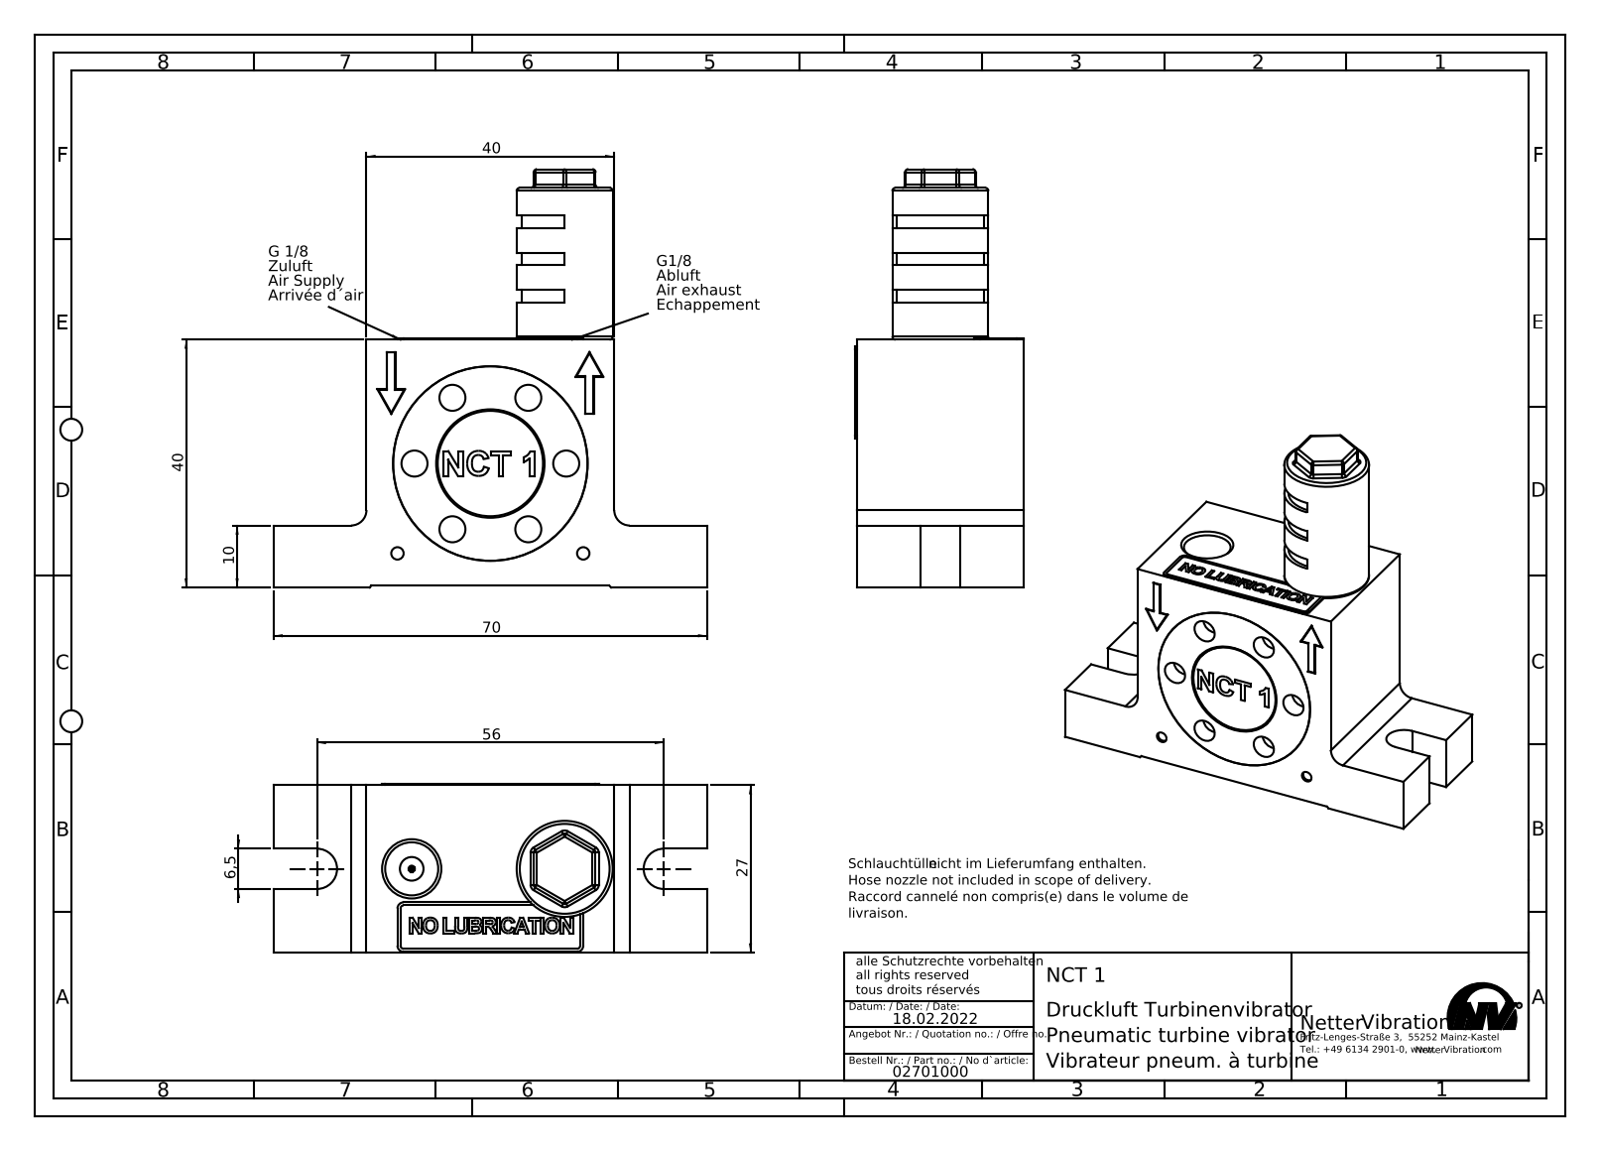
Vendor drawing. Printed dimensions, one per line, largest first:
70
56
40
40
27
10
6,5
